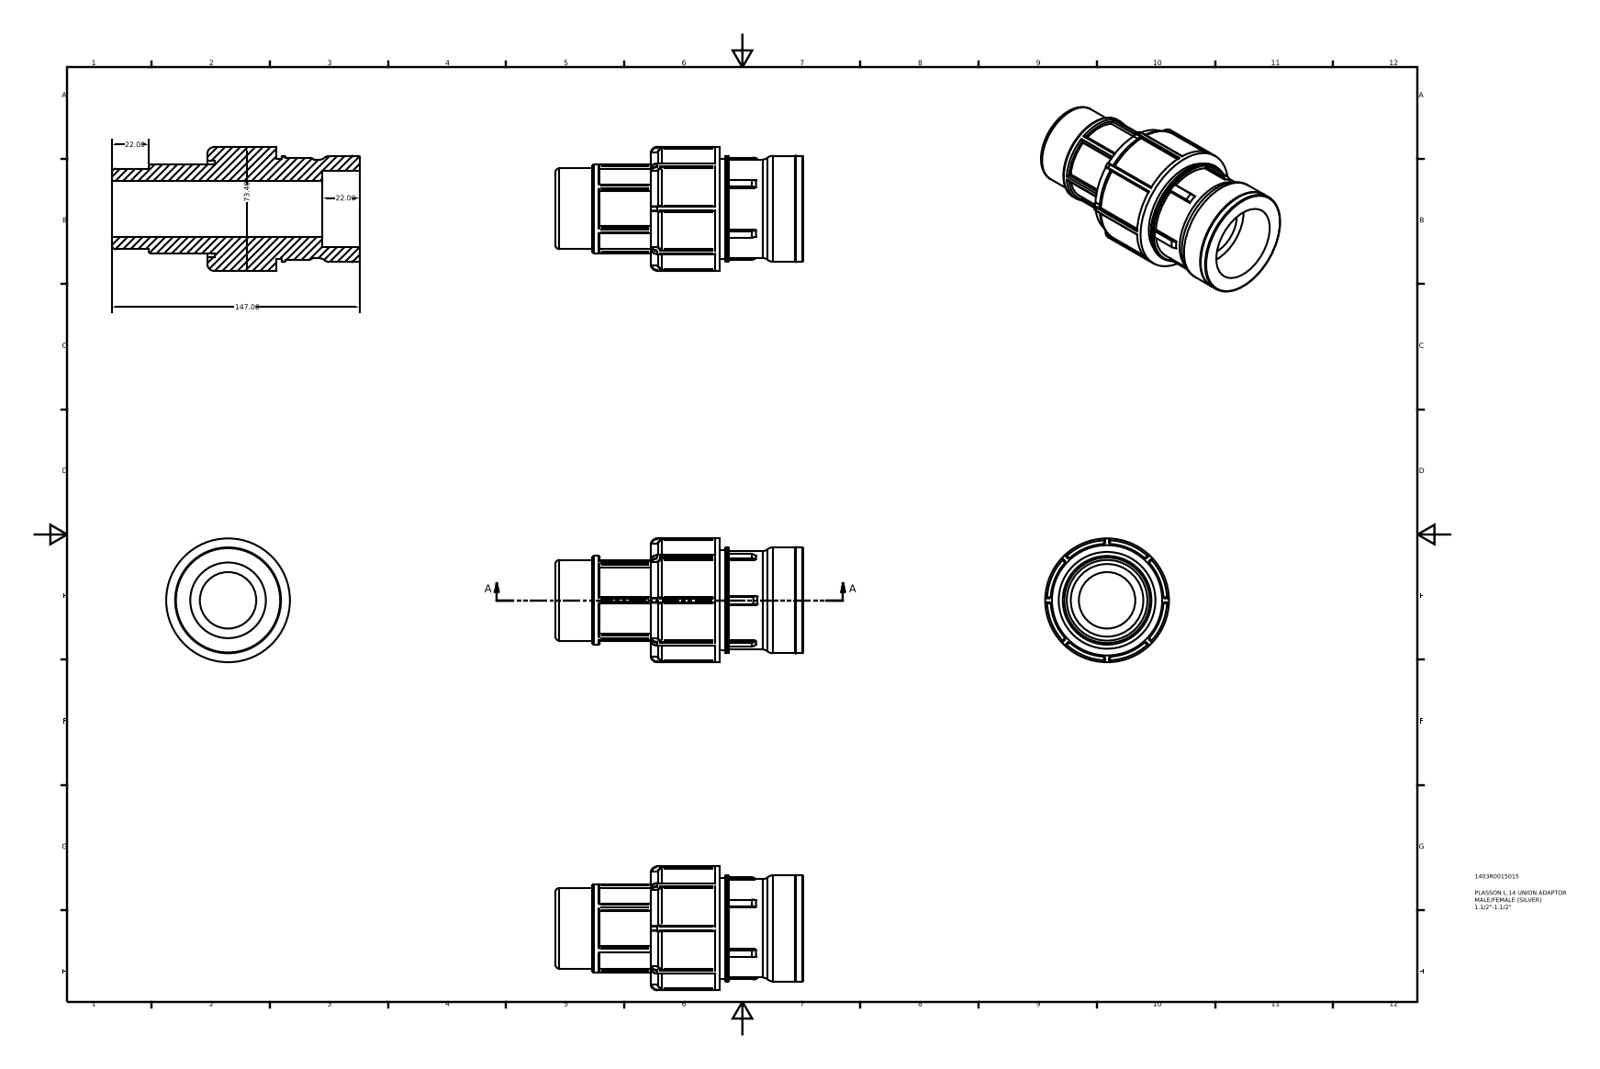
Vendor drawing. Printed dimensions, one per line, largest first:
147.00
73.40
22.00
22.00
